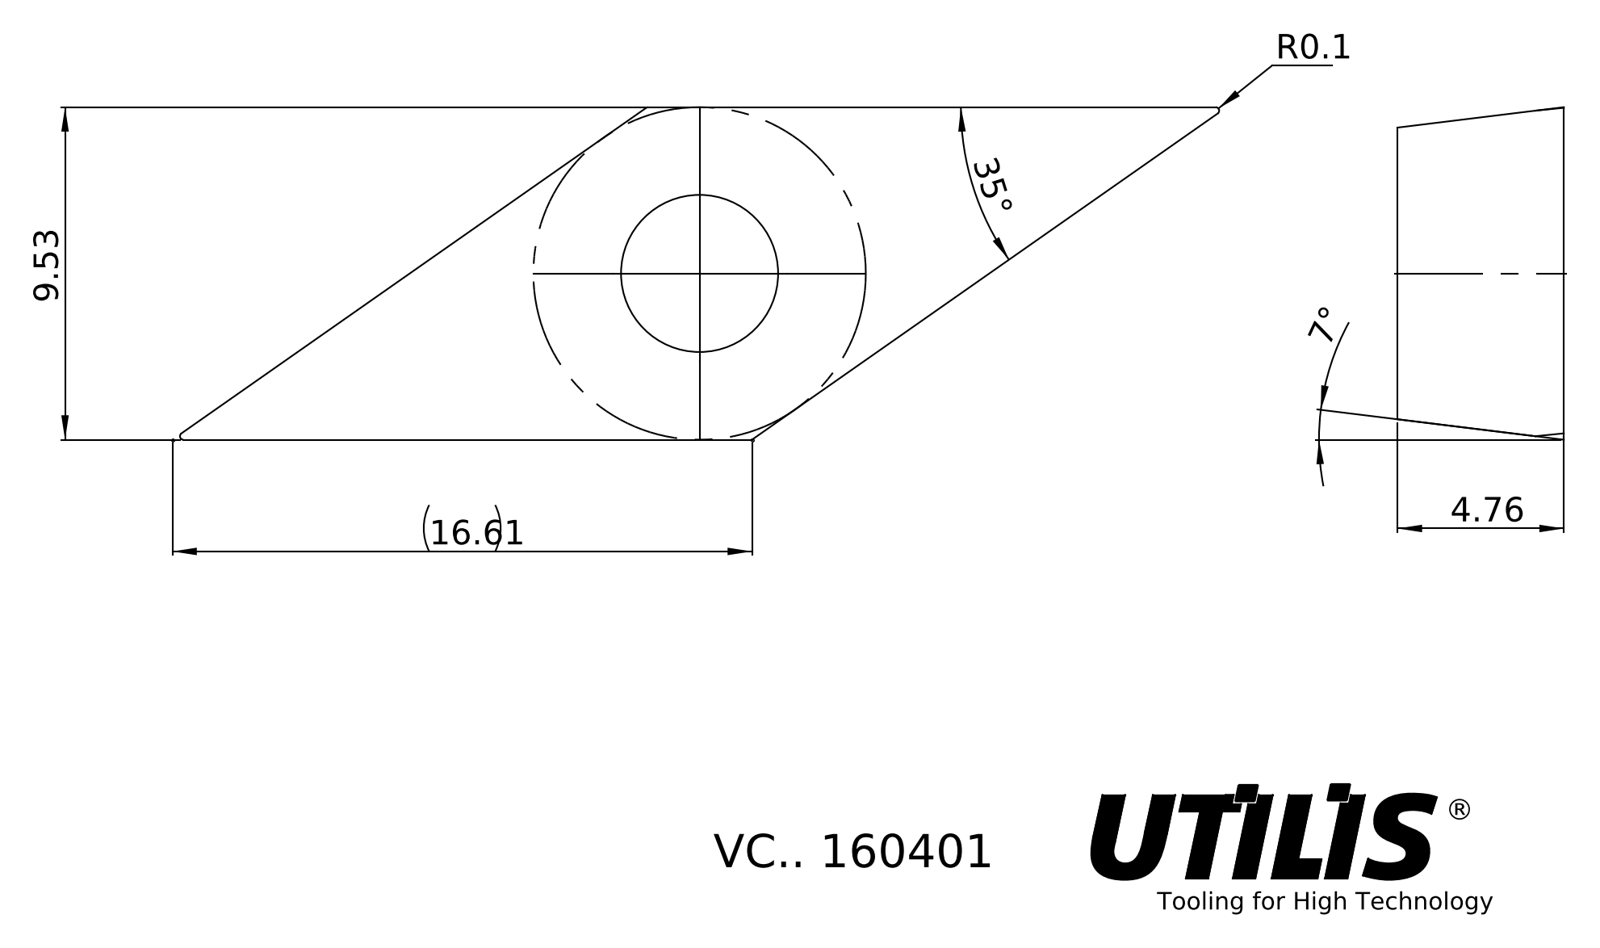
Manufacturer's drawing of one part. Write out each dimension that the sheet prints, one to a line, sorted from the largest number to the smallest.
35°
16.61
9.53
4.76
R0.1
